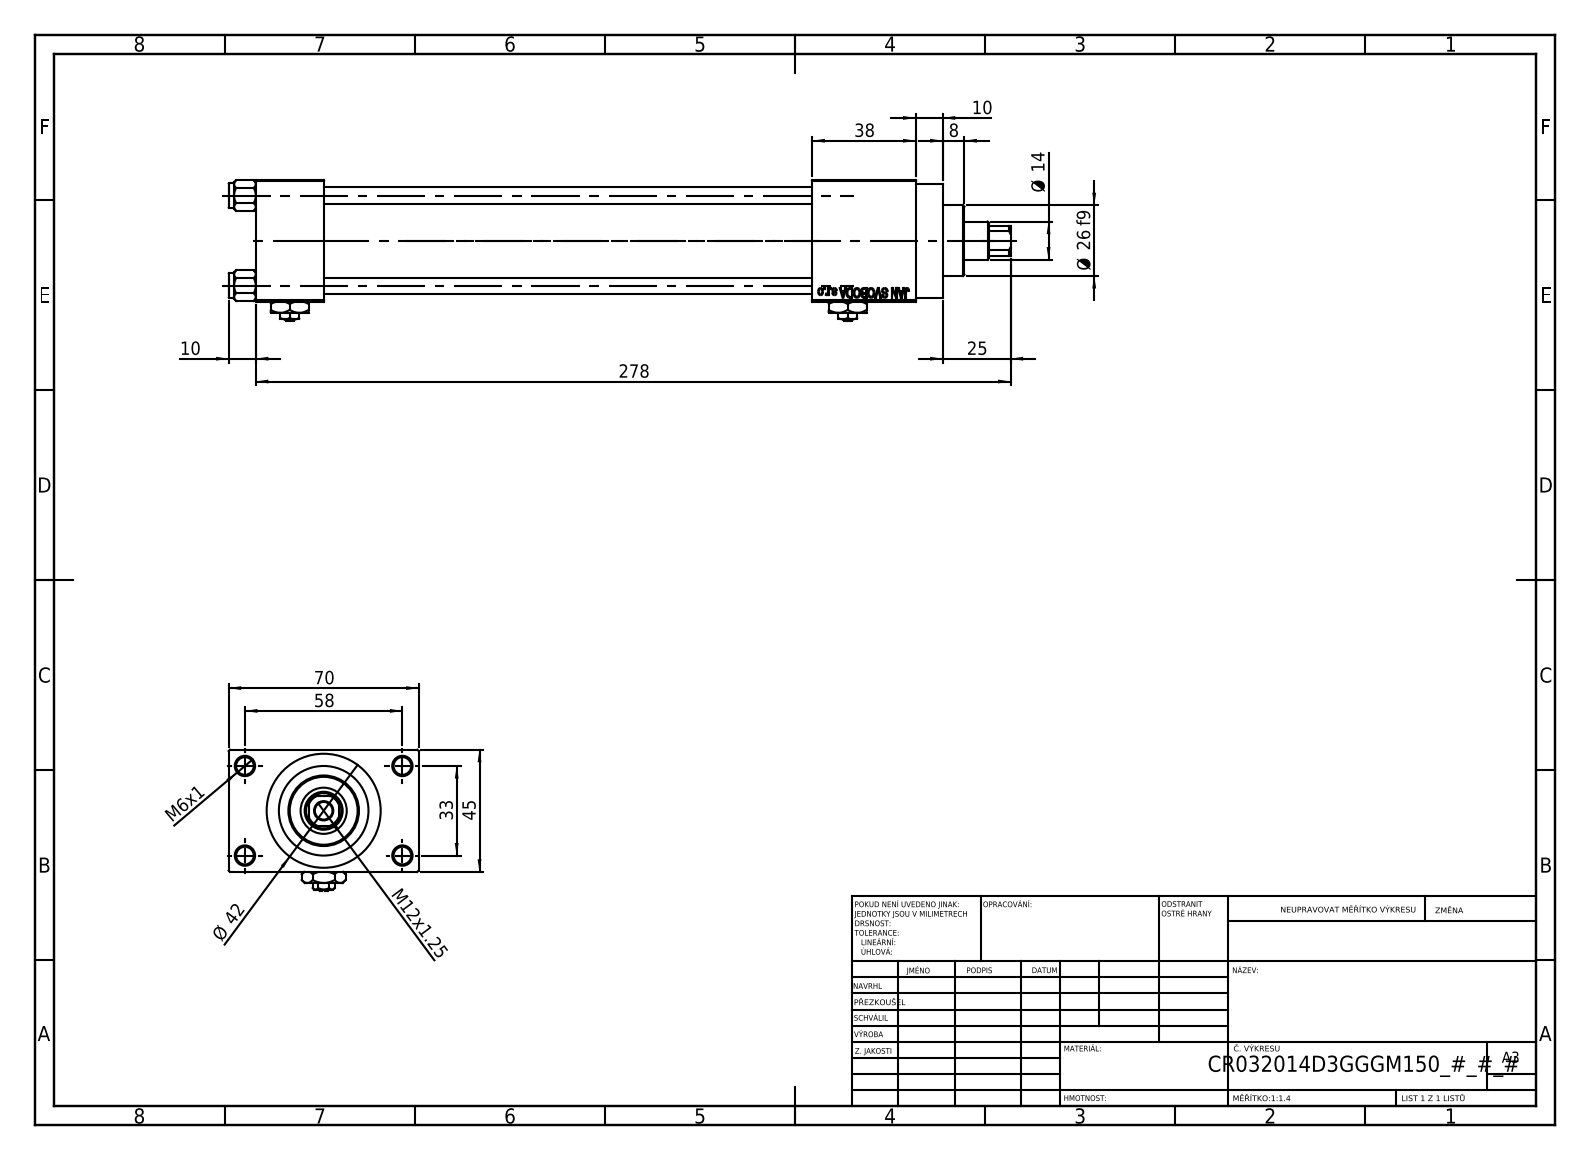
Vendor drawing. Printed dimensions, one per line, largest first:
278
70
58
45
Ø 42
38
33
Ø 26 f9
25
Ø 14
M12x1.25
10
10
8
M6x1
